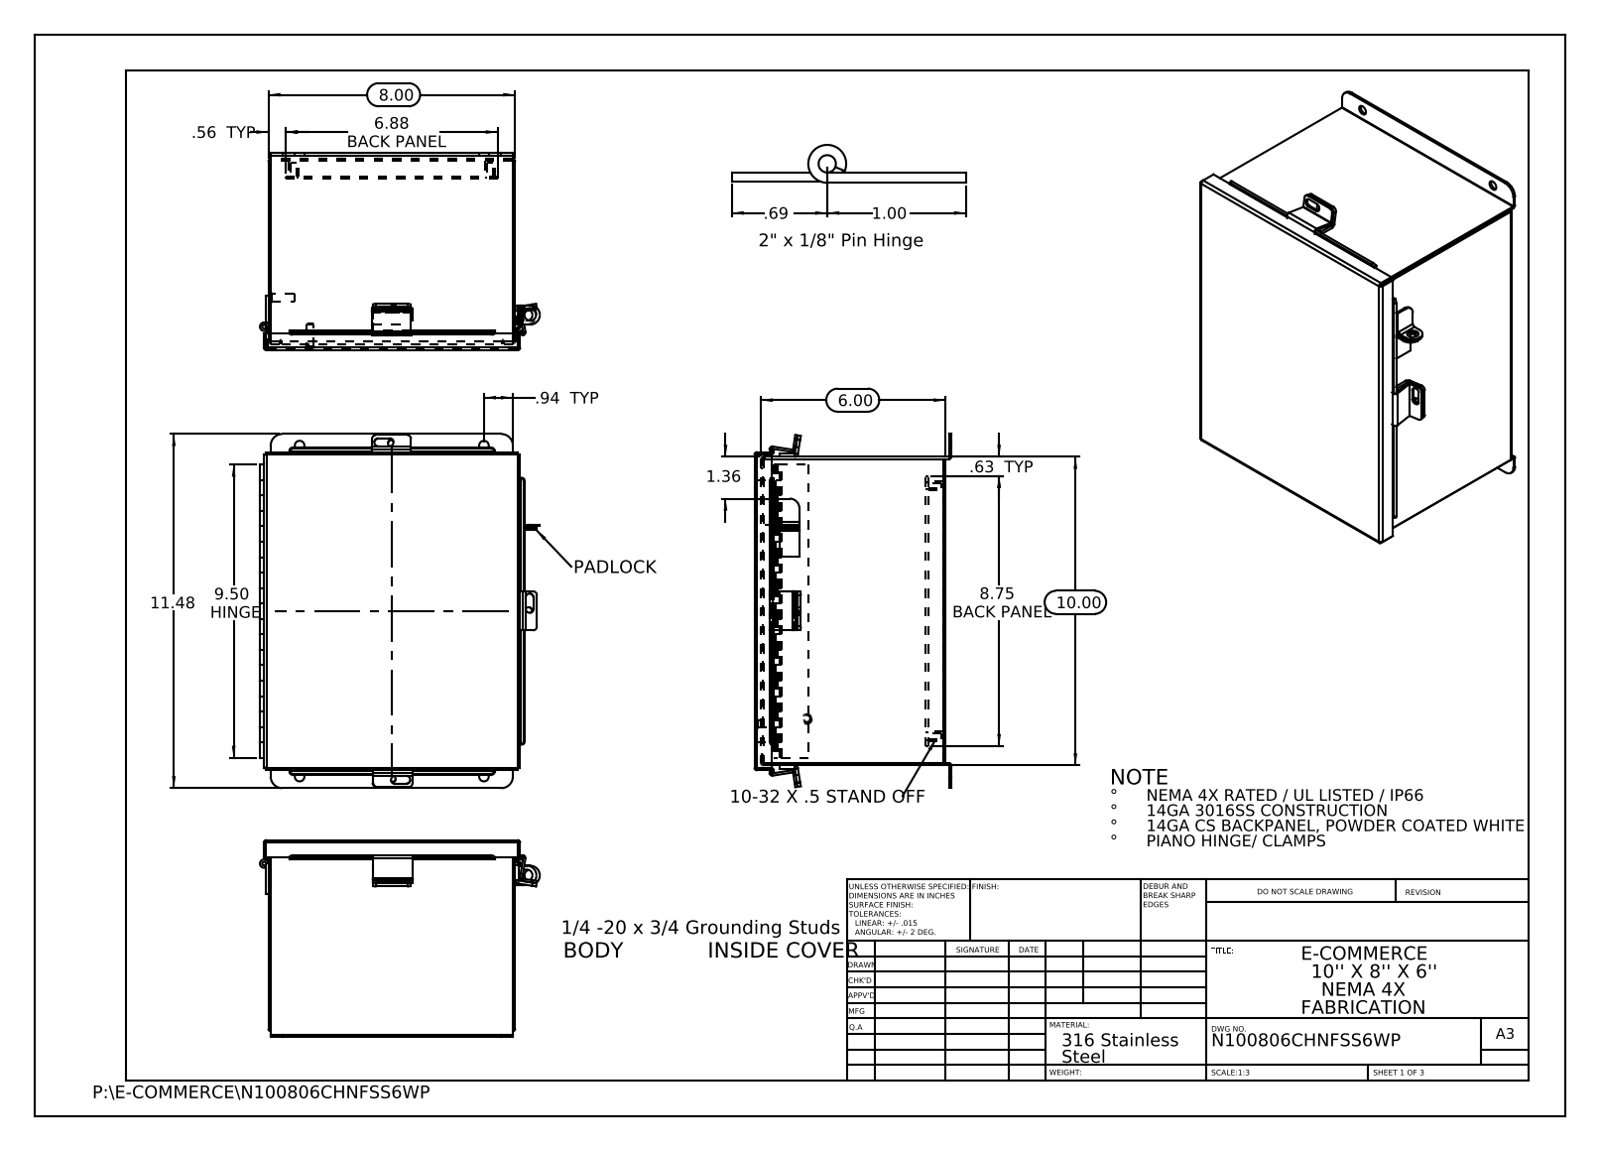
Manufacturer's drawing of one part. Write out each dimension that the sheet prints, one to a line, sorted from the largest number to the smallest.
11.48
10.00
9.50 HINGE
8.75 BACK PANEL
8.00
6.88 BACK PANEL
6.00
1.36
1.00
.94 TYP
.69
.63 TYP
.56 TYP
